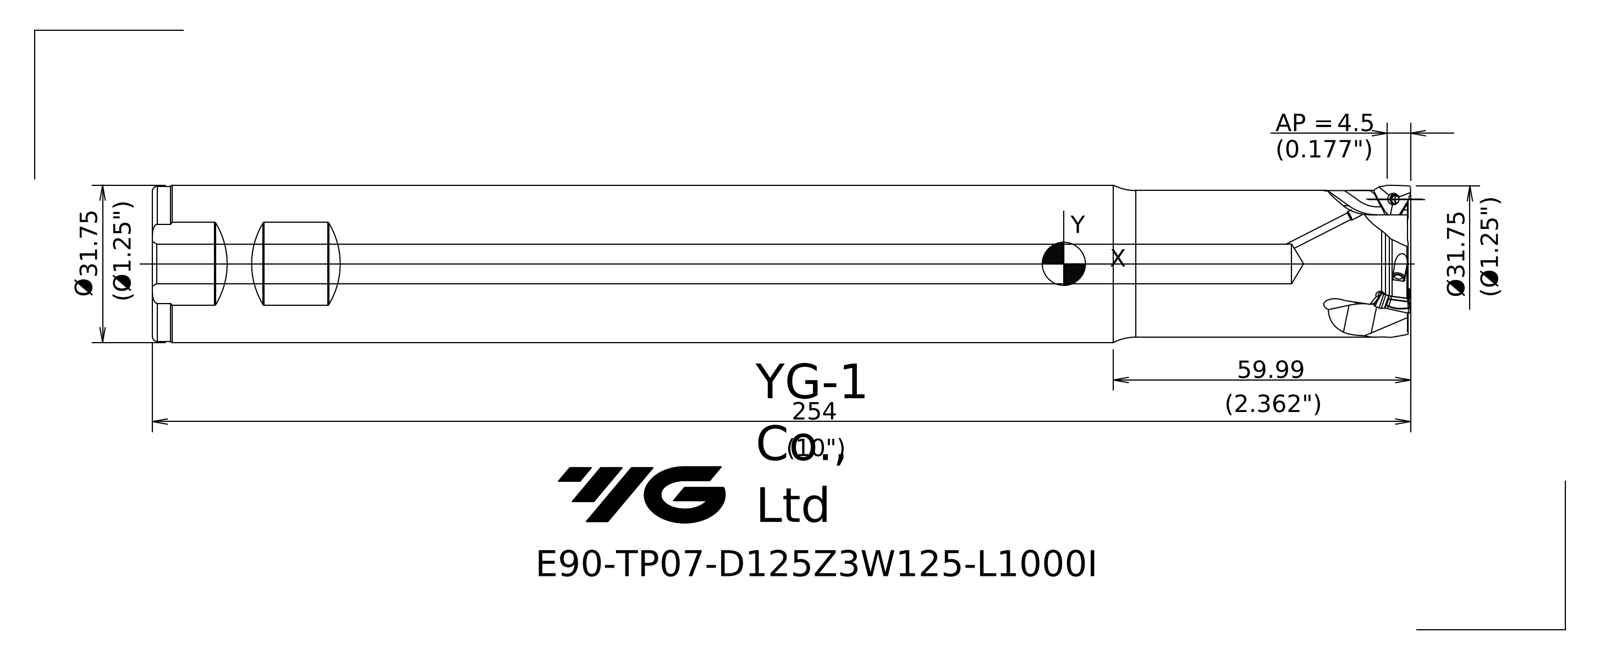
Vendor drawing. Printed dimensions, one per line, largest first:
254
59.99
Ø31.75
4.5 AP =
